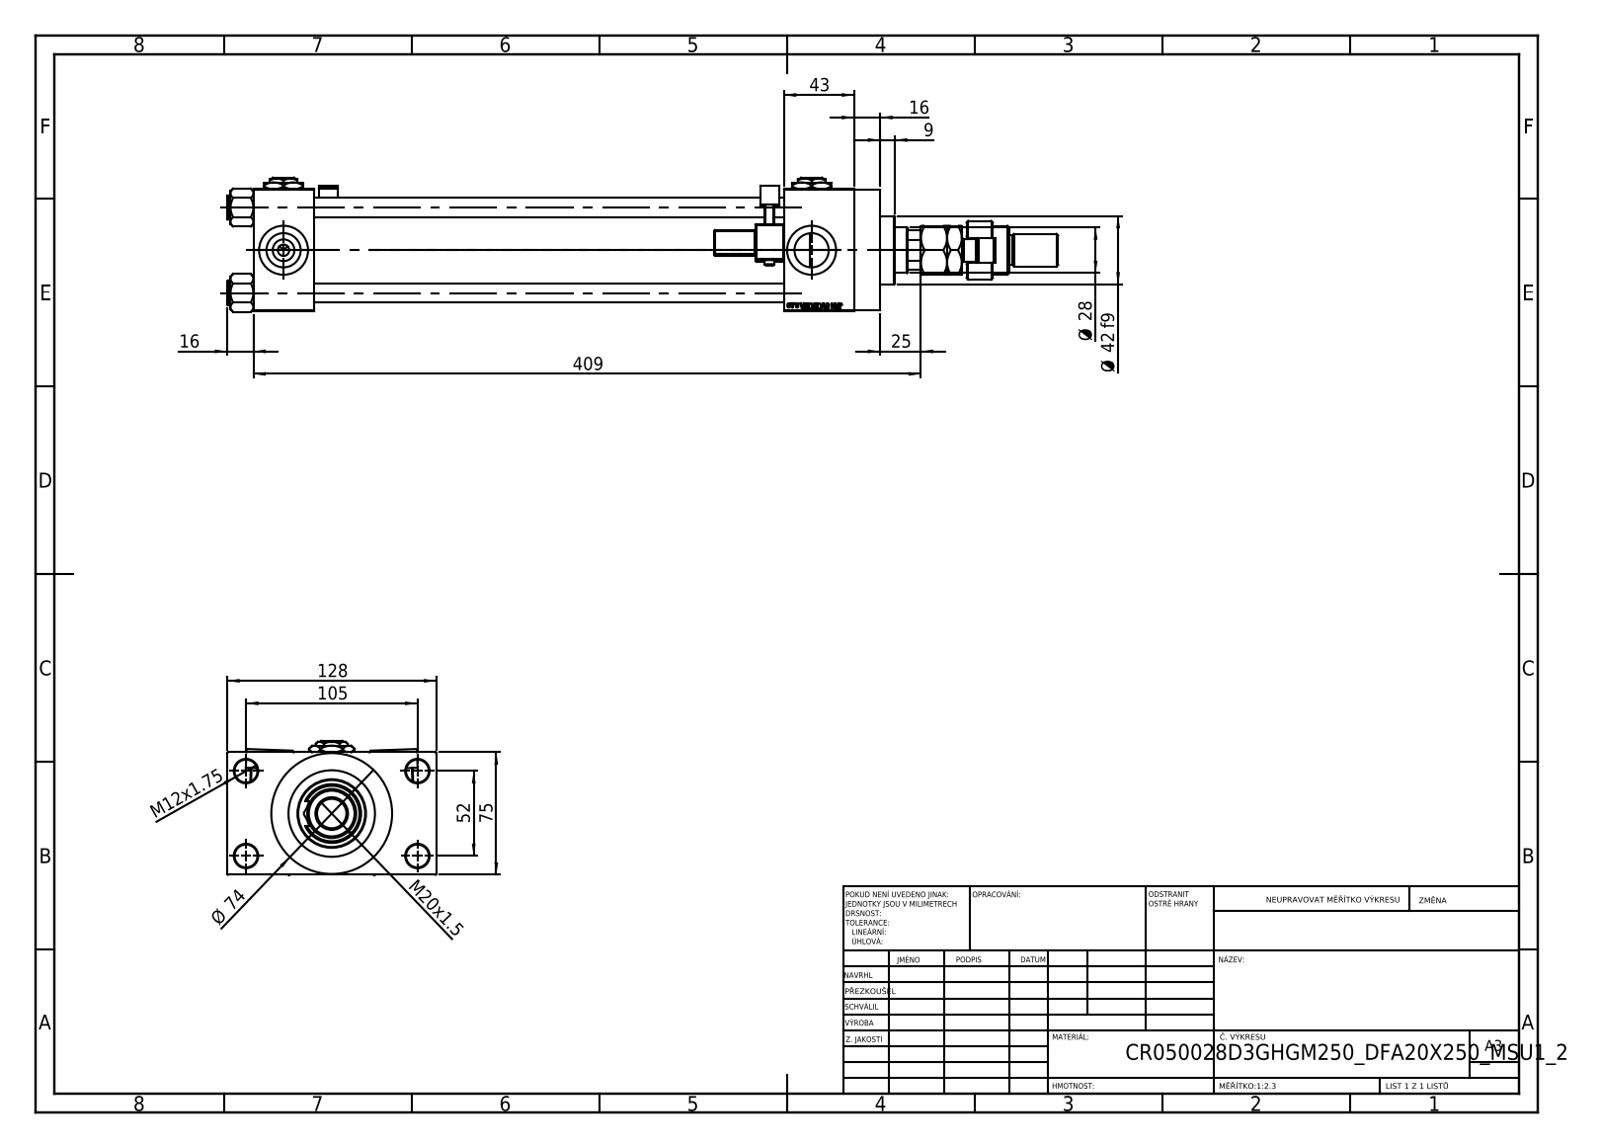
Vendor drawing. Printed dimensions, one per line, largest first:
409
128
105
75
Ø 74
52
43
Ø 42 f9
Ø 28
25
M20x1.5
16
16
M12x1.75
9
